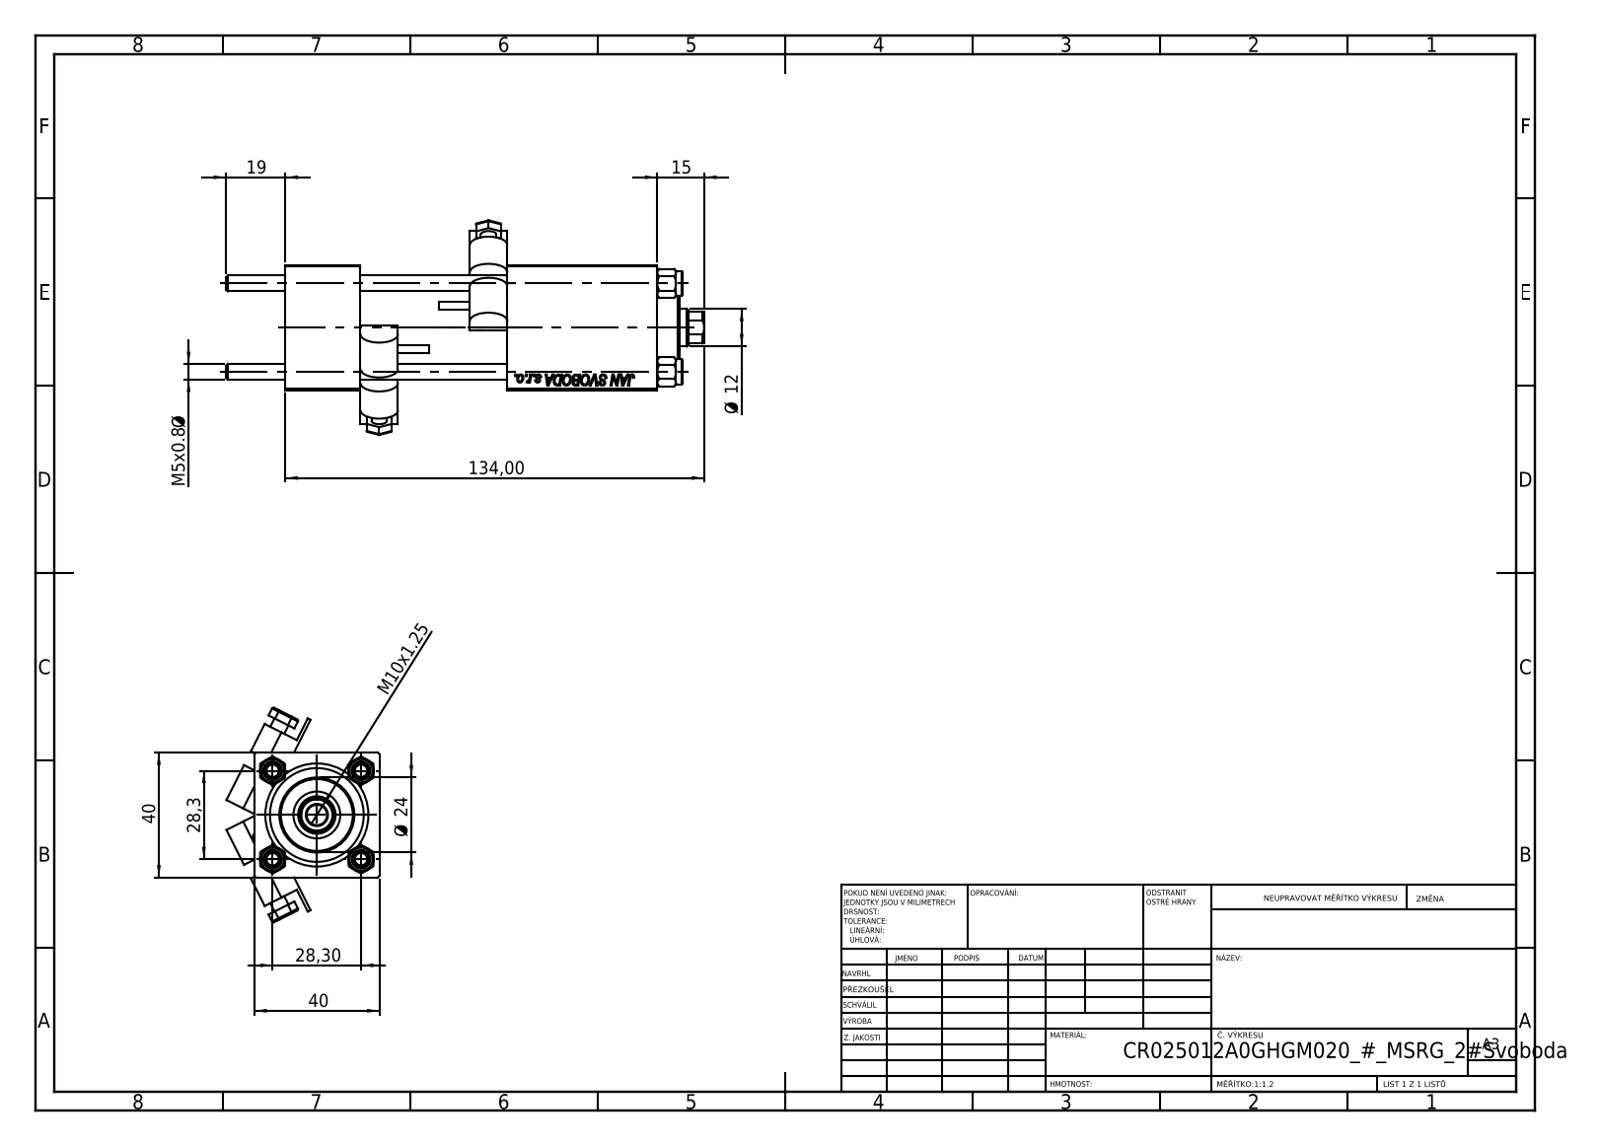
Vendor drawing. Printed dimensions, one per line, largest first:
134,00
40
40
28,3
28,30
Ø 24
19
15
Ø 12
M10x1.25
M5x0.8 Ø
